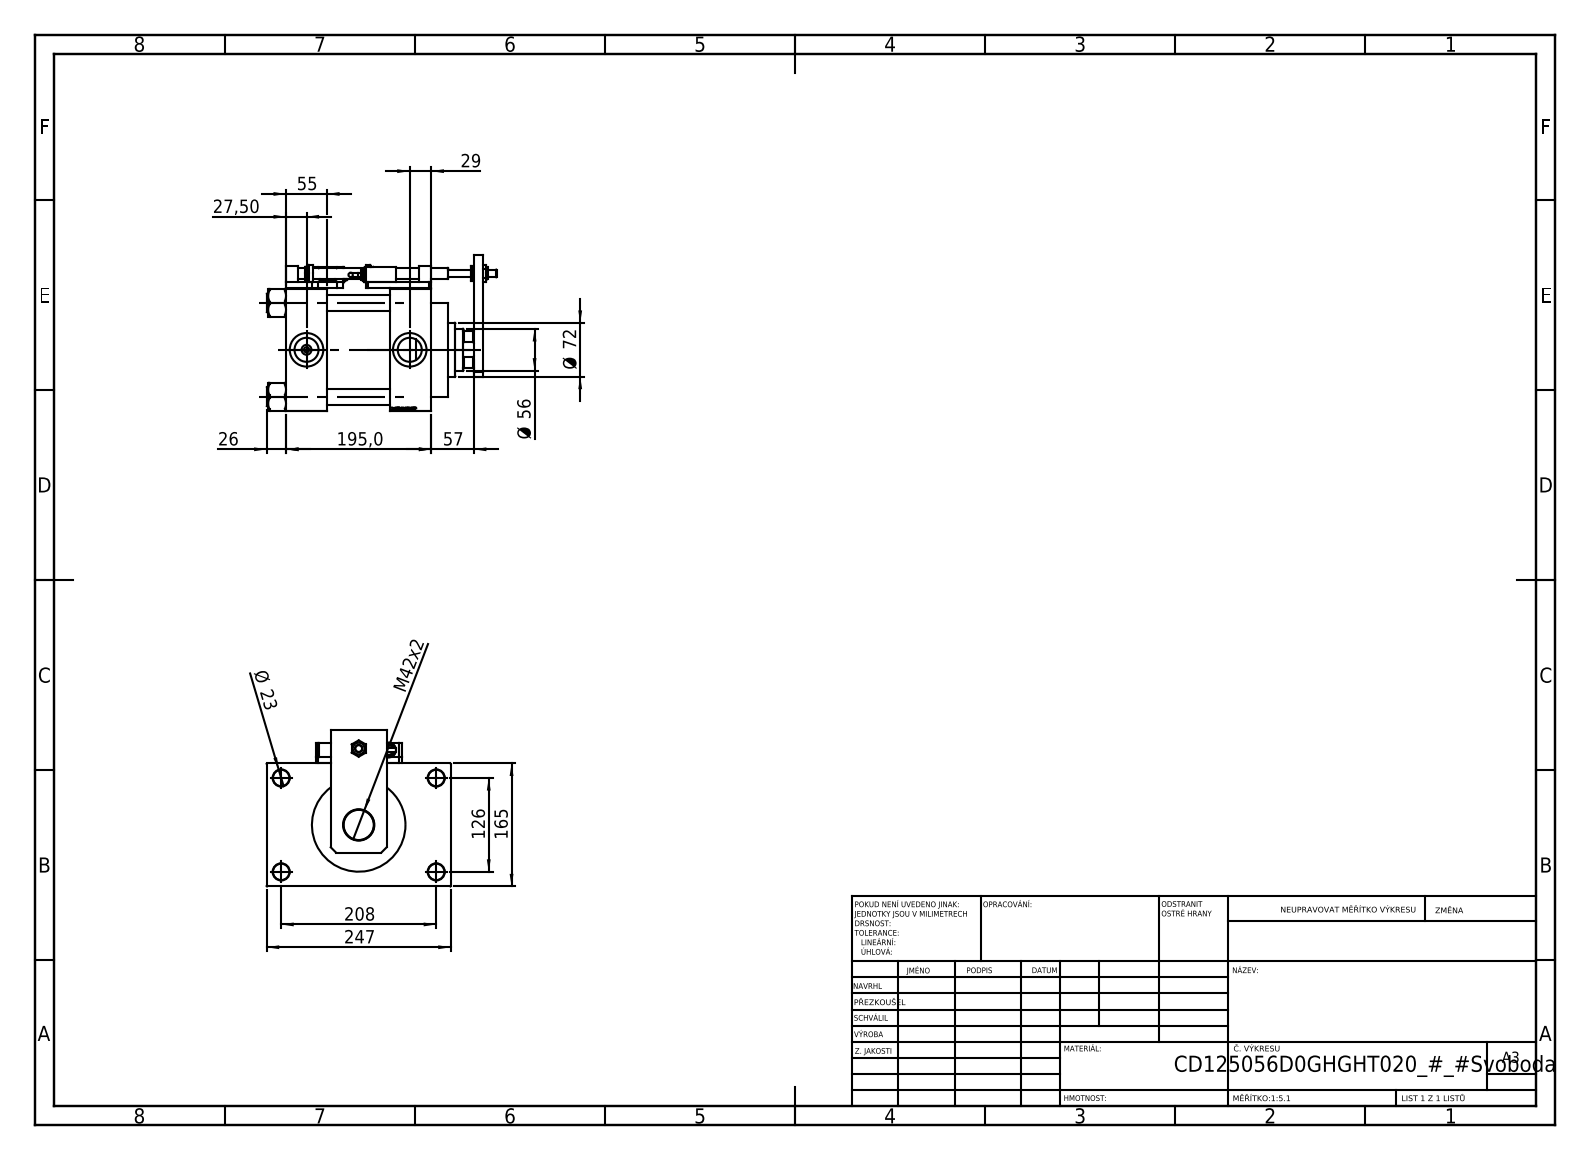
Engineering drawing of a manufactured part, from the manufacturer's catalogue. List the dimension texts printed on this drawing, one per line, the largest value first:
247
208
195,0
165
126
Ø 72
57
Ø 56
55
M42x2
29
27,50
26
Ø 23
